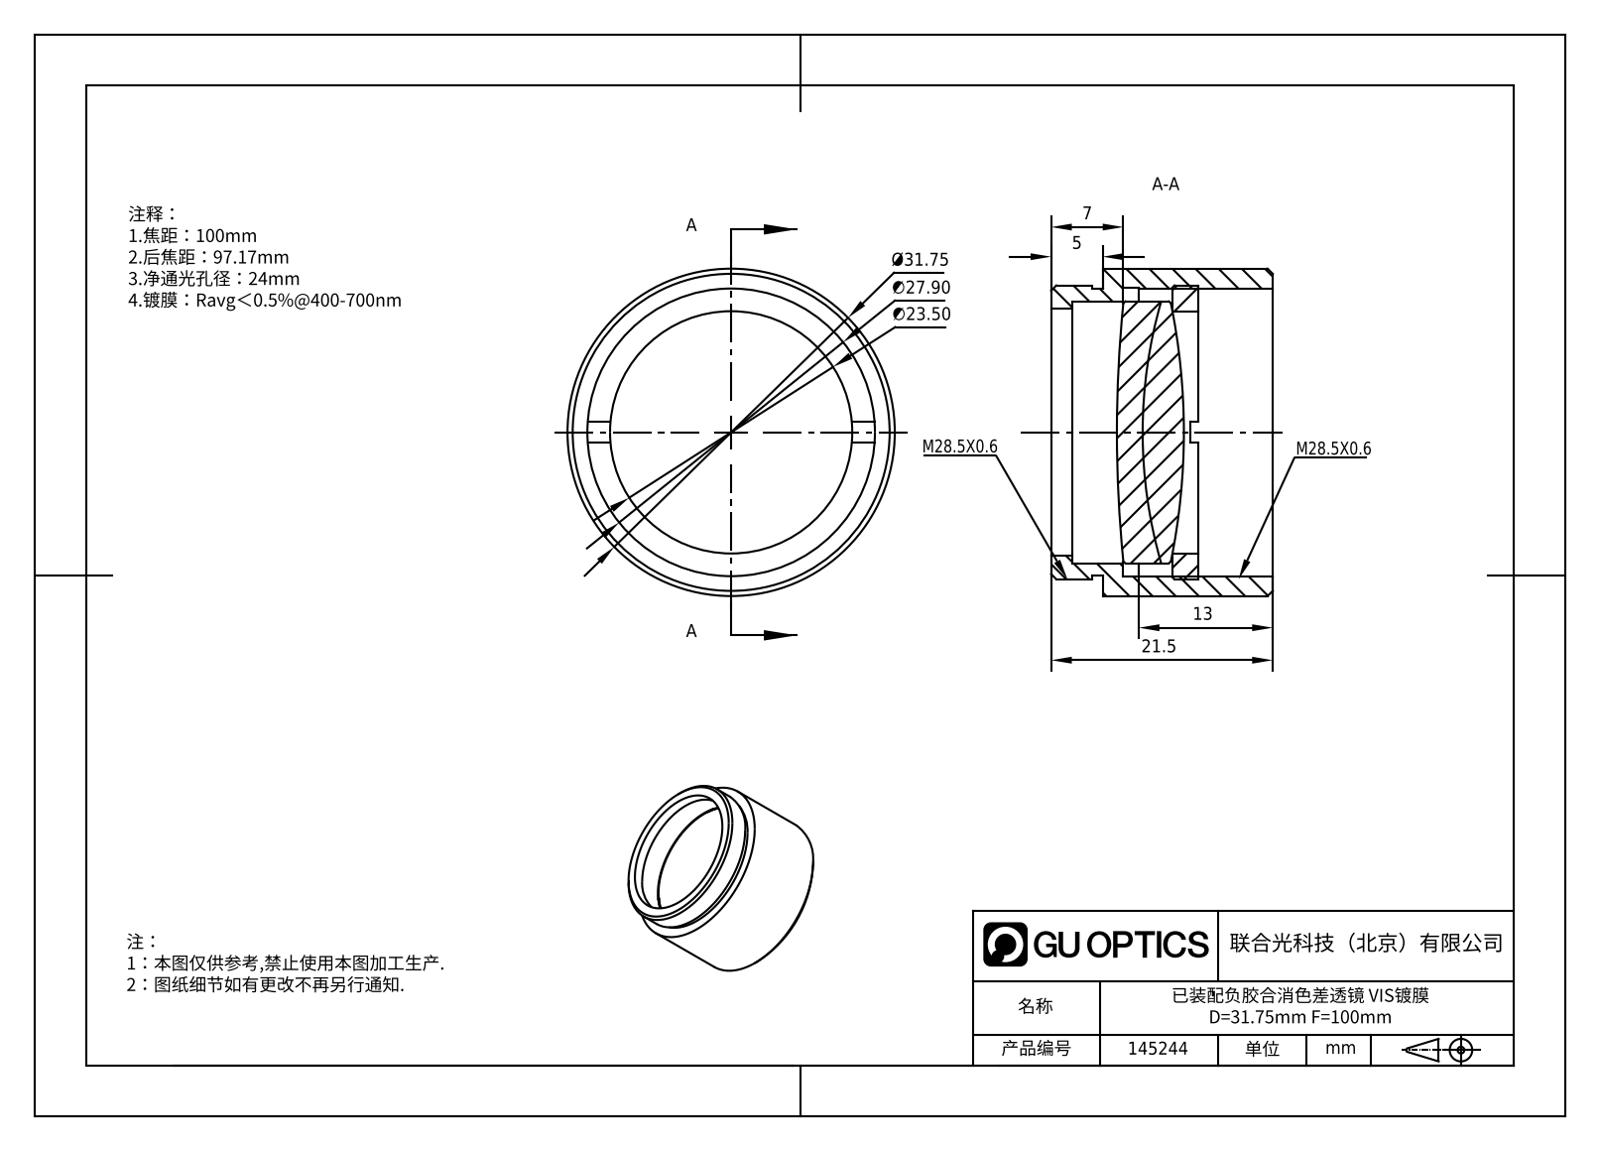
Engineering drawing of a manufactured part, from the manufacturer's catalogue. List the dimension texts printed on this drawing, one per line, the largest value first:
Ø31.75
∅27.90
∅23.50
21.5
13
7
5
